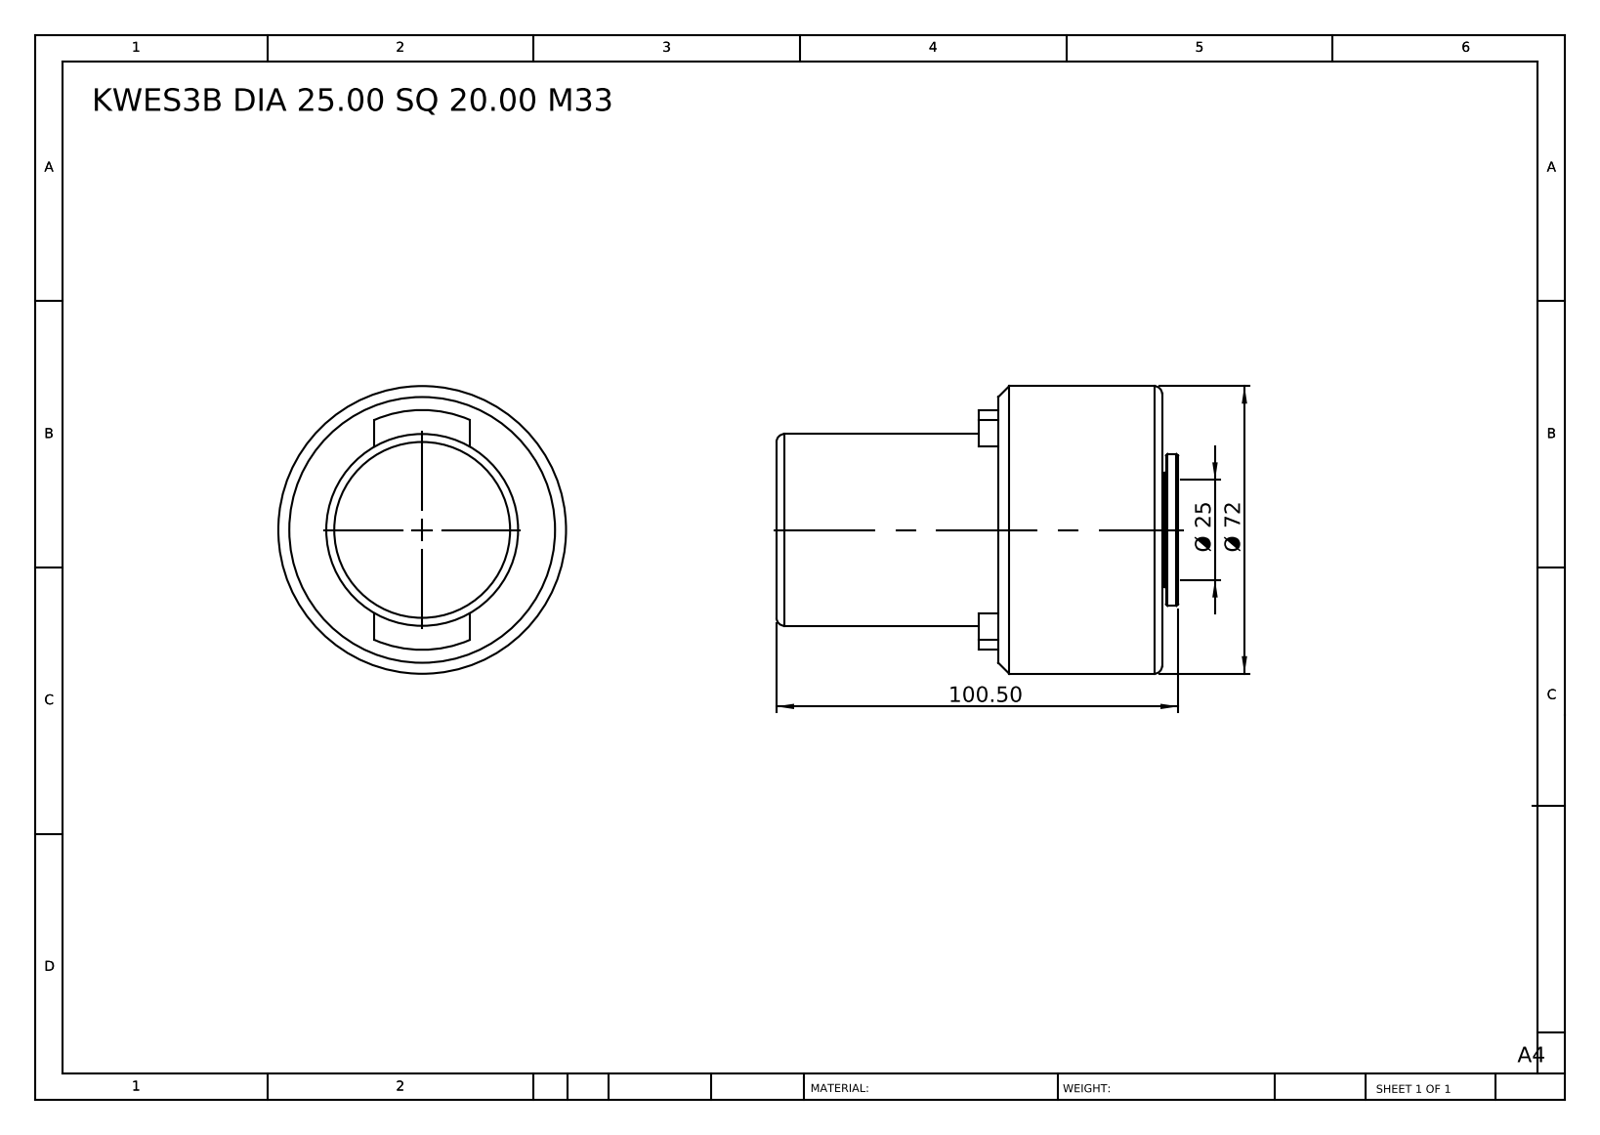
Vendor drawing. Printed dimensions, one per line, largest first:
100.50
Ø 72
Ø 25
